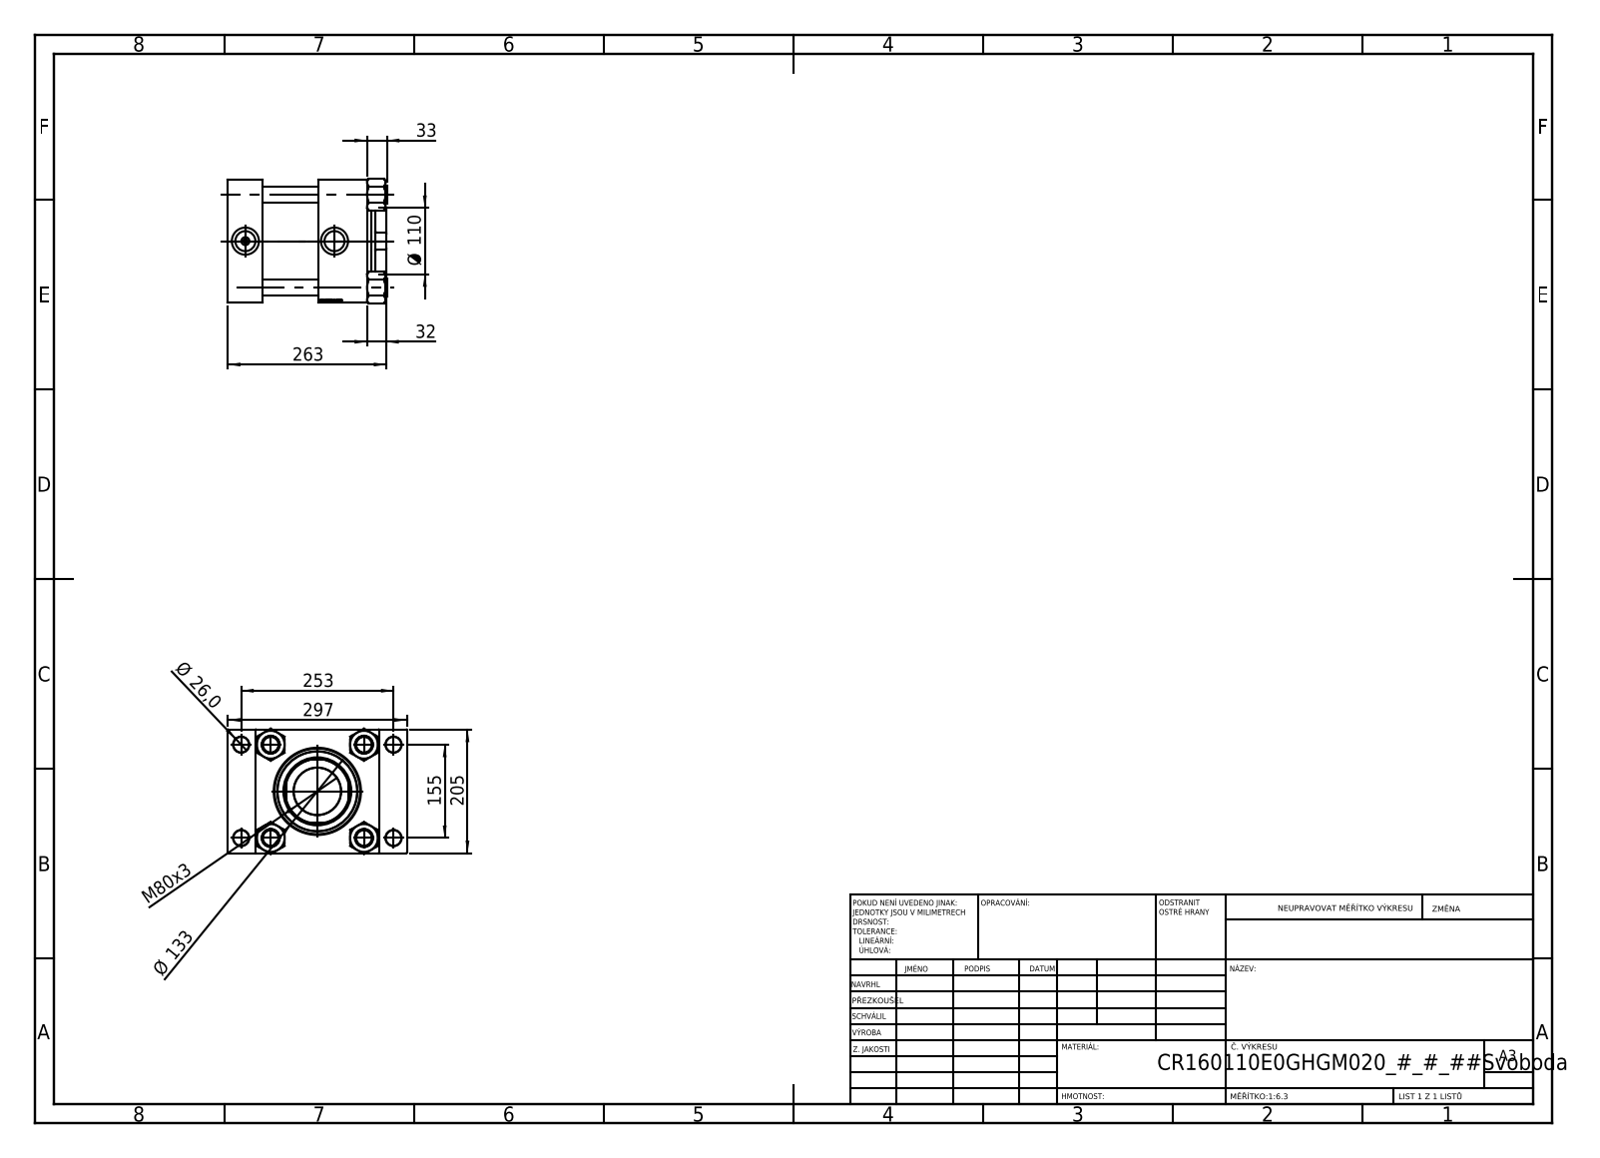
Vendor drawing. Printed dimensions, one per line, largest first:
297
263
253
205
155
Ø 133
Ø 110
M80x3
33
32
Ø 26,0
